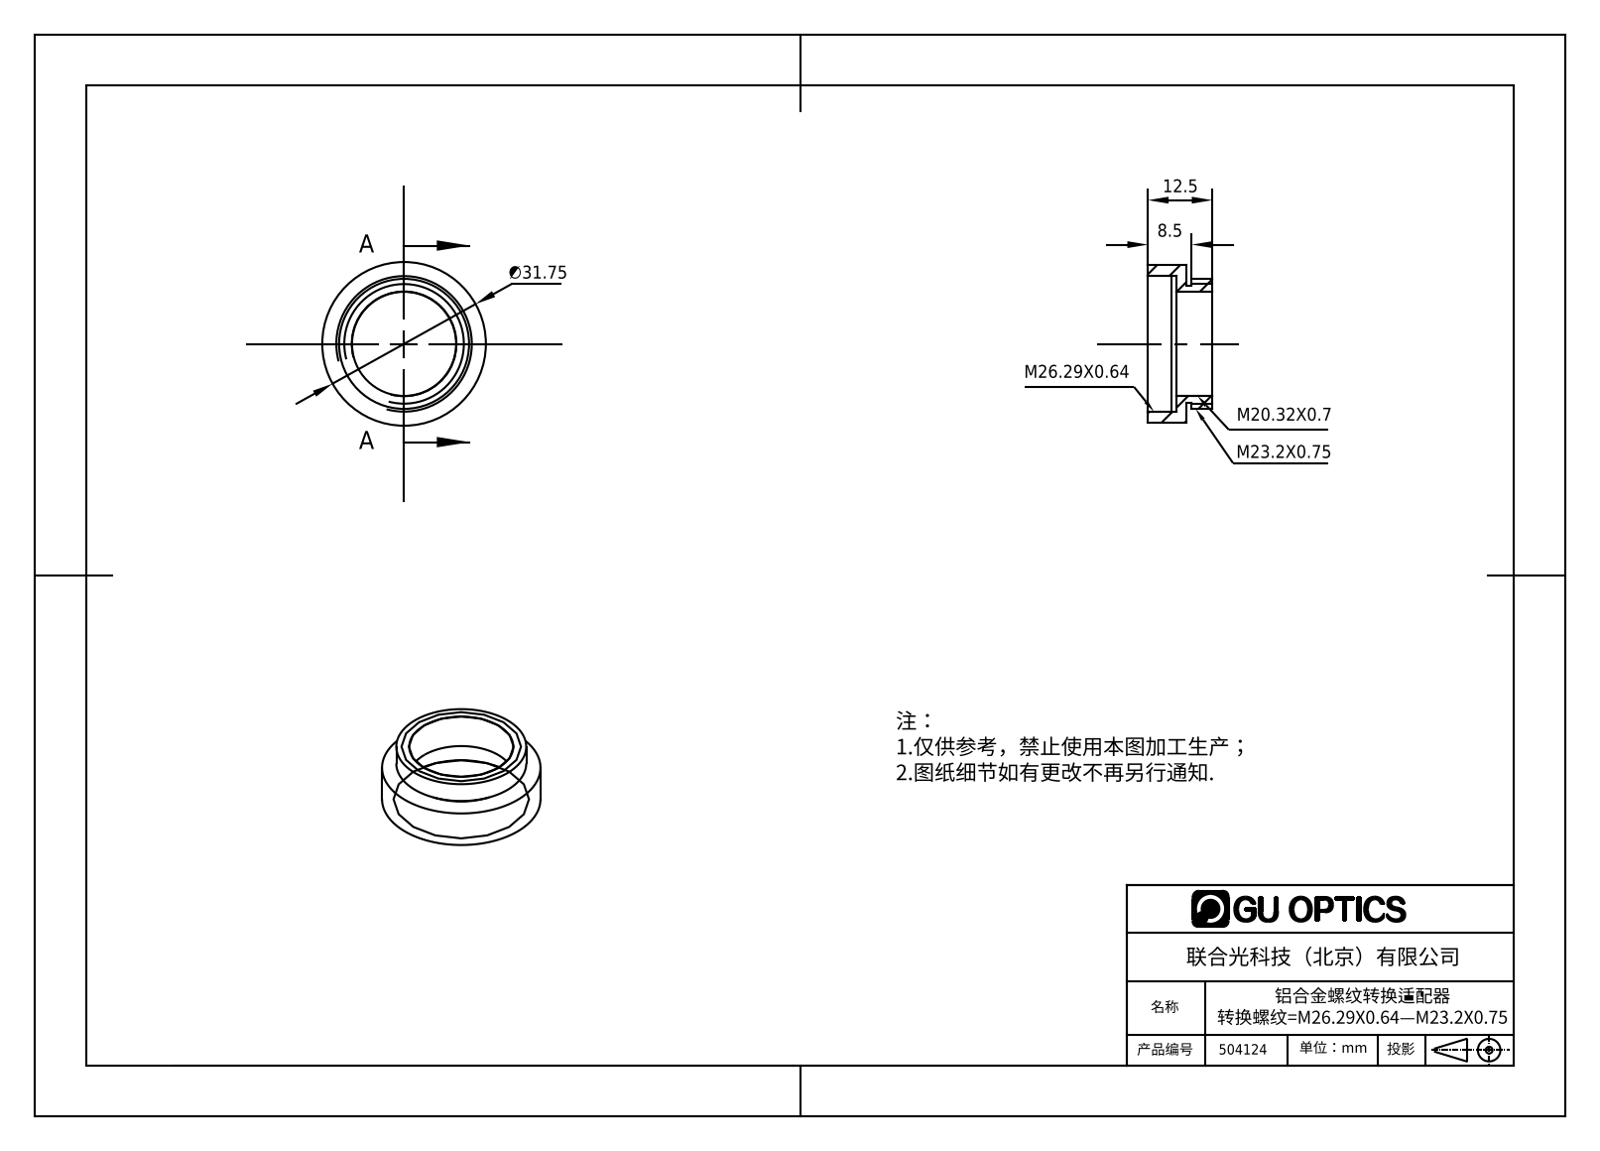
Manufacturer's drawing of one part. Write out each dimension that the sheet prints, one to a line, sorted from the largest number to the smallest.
∅31.75
12.5
8.5
